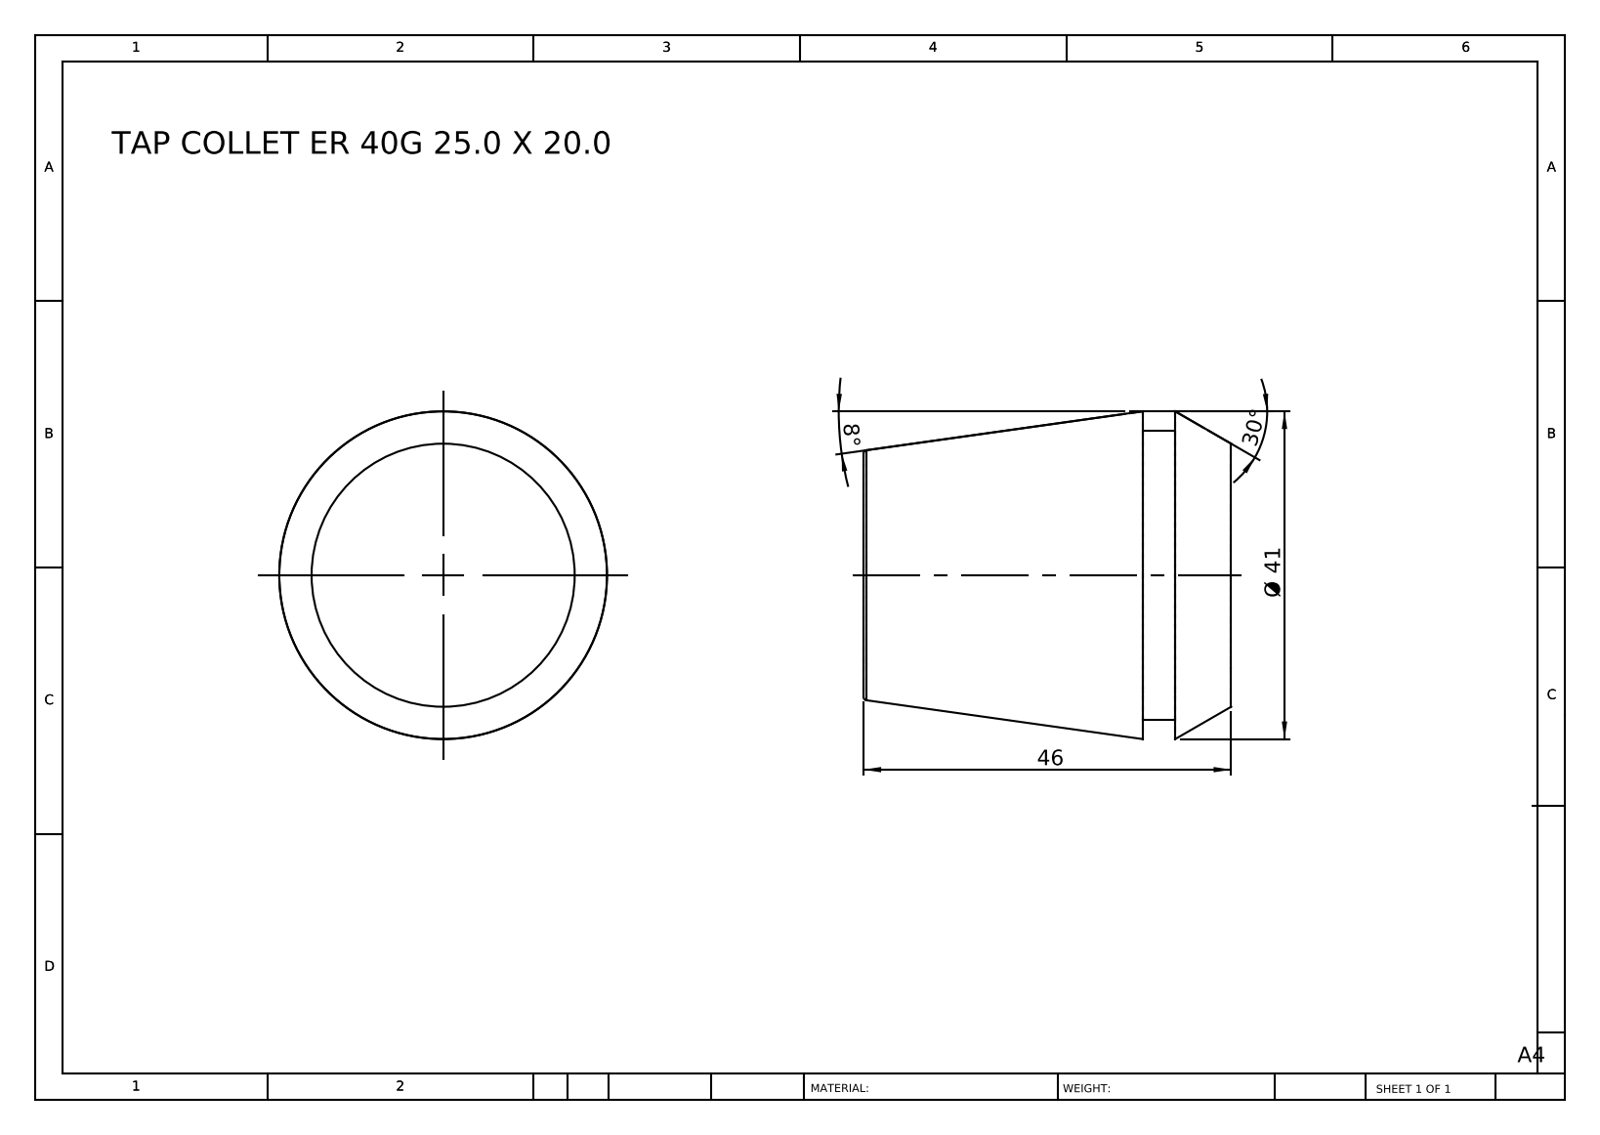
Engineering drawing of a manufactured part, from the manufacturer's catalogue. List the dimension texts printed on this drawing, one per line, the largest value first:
46
Ø 41
30°
8°
